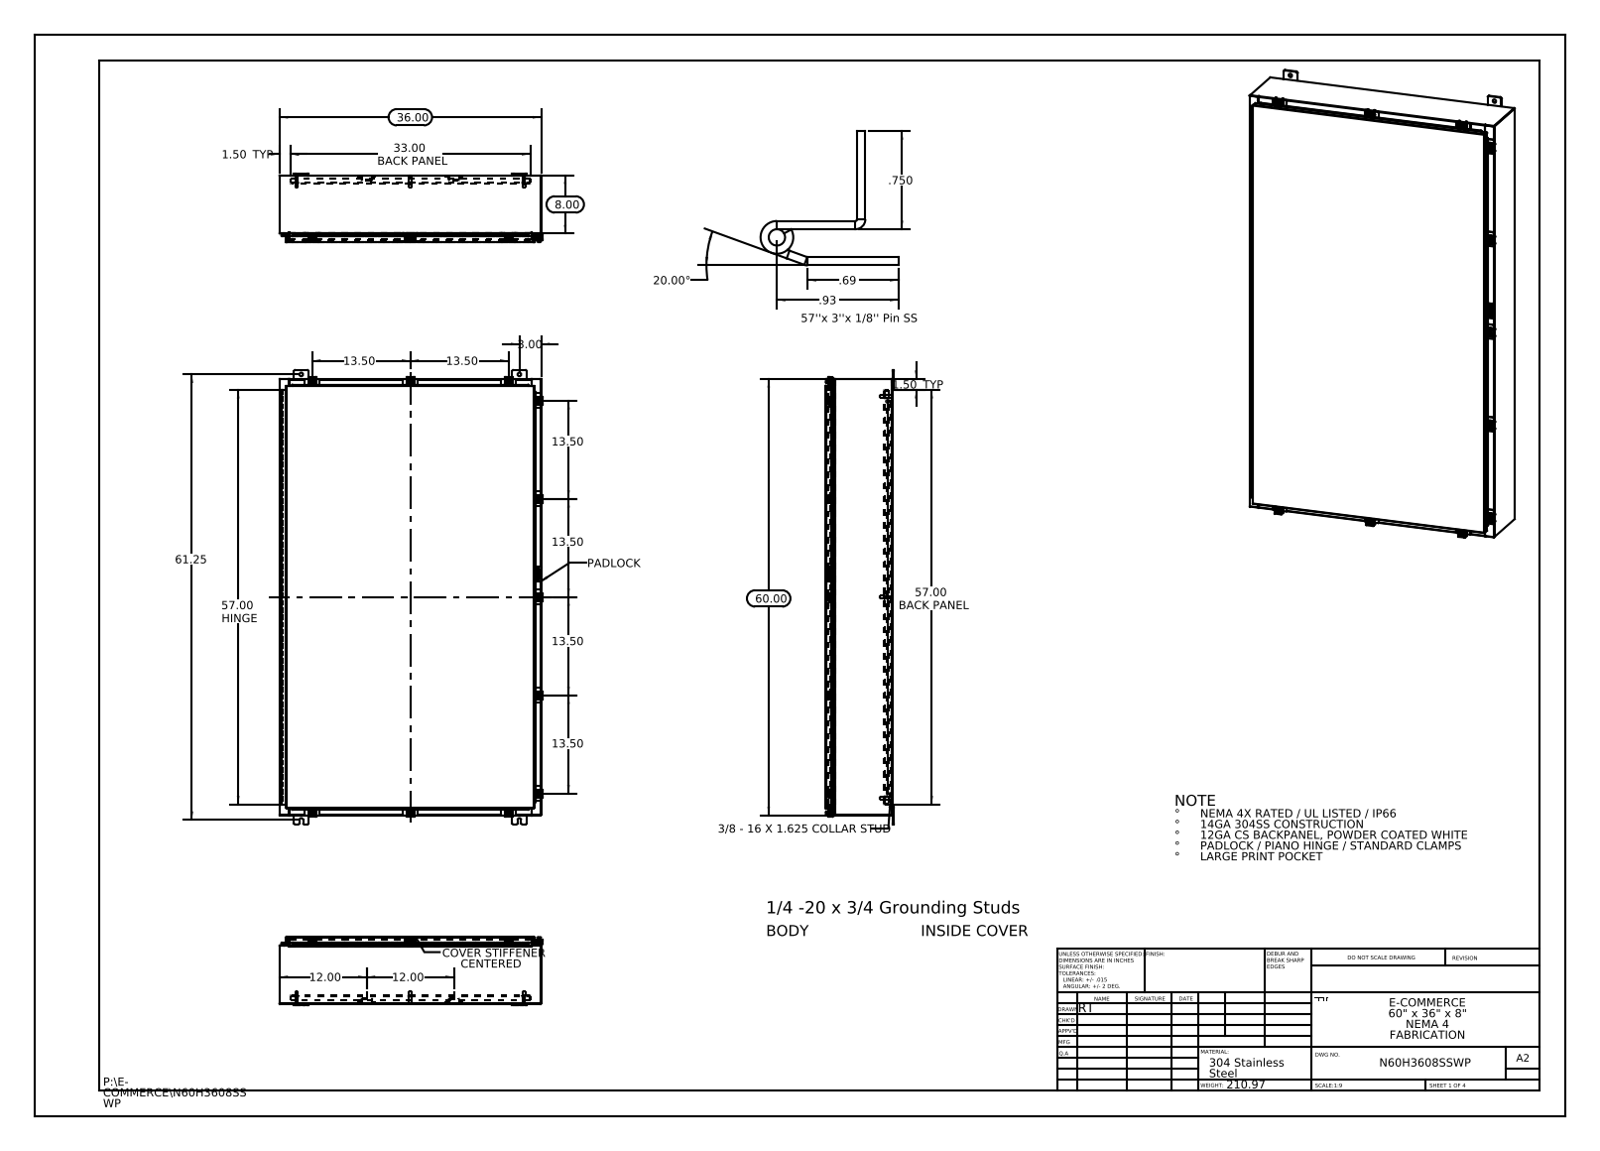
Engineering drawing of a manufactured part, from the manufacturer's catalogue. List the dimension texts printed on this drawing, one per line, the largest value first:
61.25
60.00
57.00 HINGE
57.00 BACK PANEL
36.00
33.00 BACK PANEL
20.00°
13.50
13.50
13.50
13.50
13.50
13.50
12.00
12.00
8.00
3.00
1.50 TYP
1.50 TYP
.93
.750
.69
